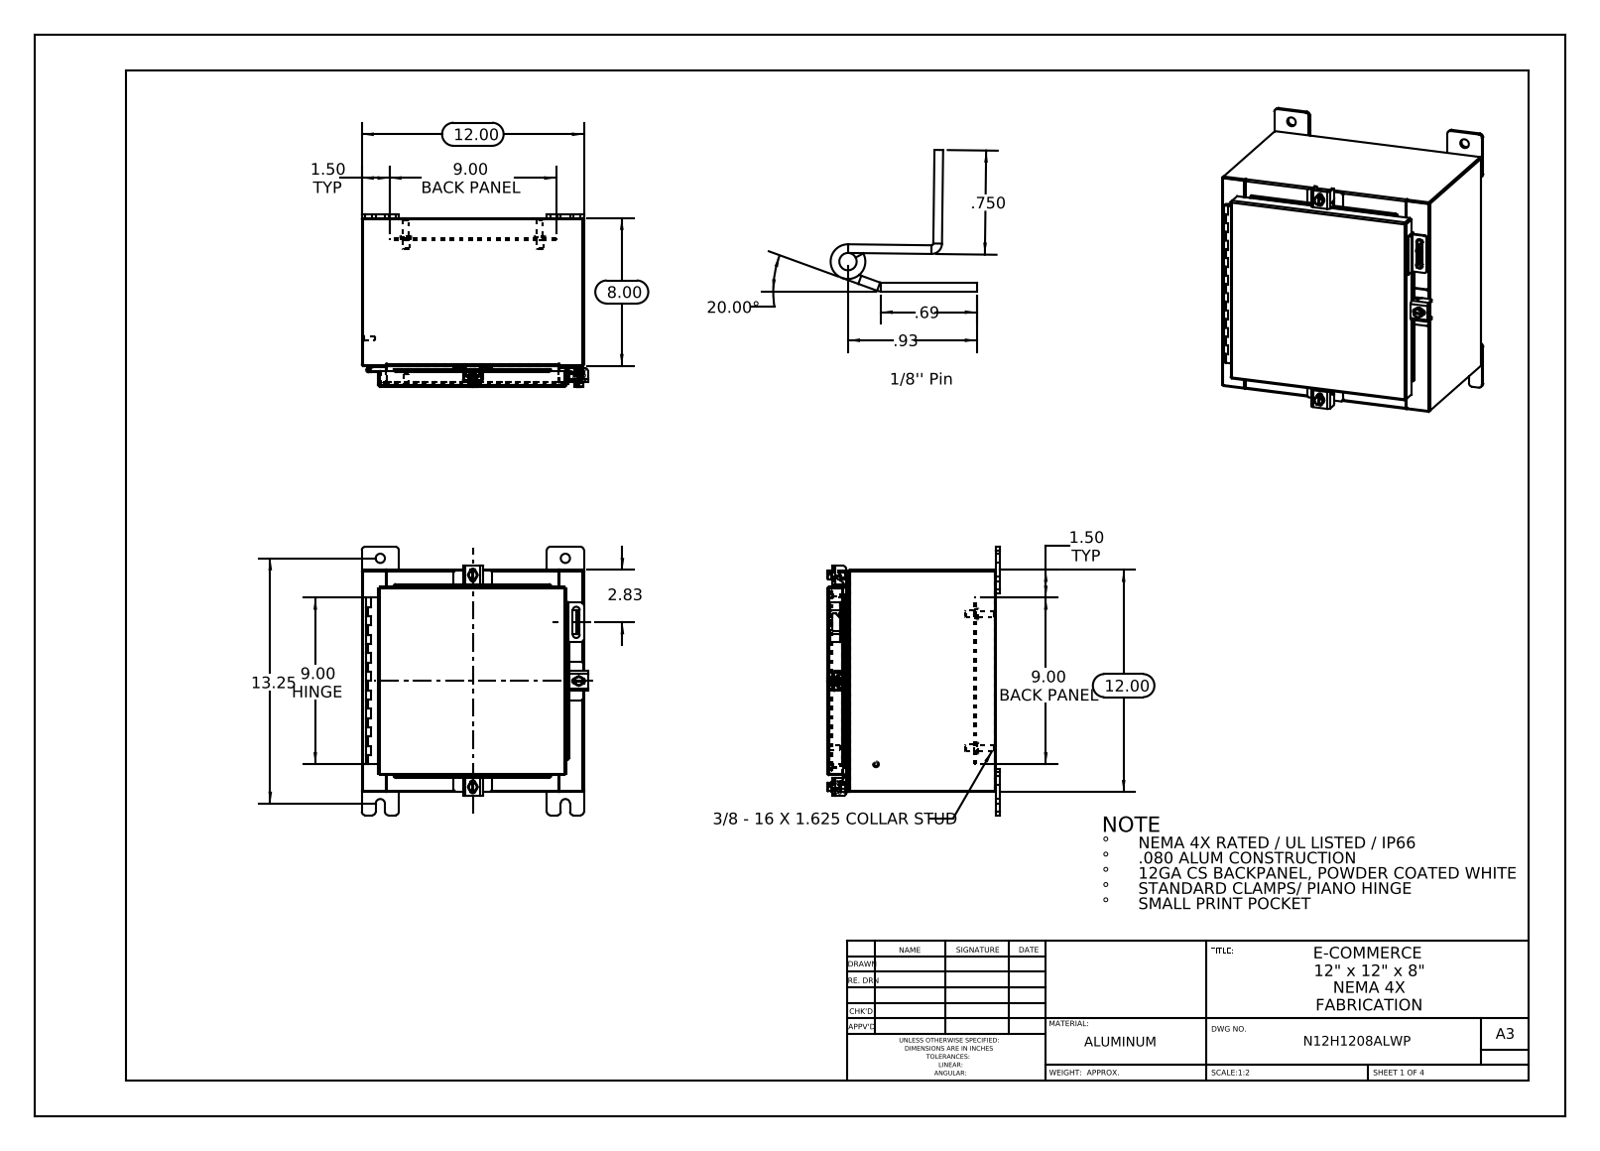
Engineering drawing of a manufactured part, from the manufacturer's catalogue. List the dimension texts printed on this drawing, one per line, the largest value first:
20.00°
13.25
12.00
12.00
9.00 HINGE
9.00 BACK PANEL
9.00 BACK PANEL
8.00
2.83
1.50 TYP
1.50 TYP
.93
.750
.69
